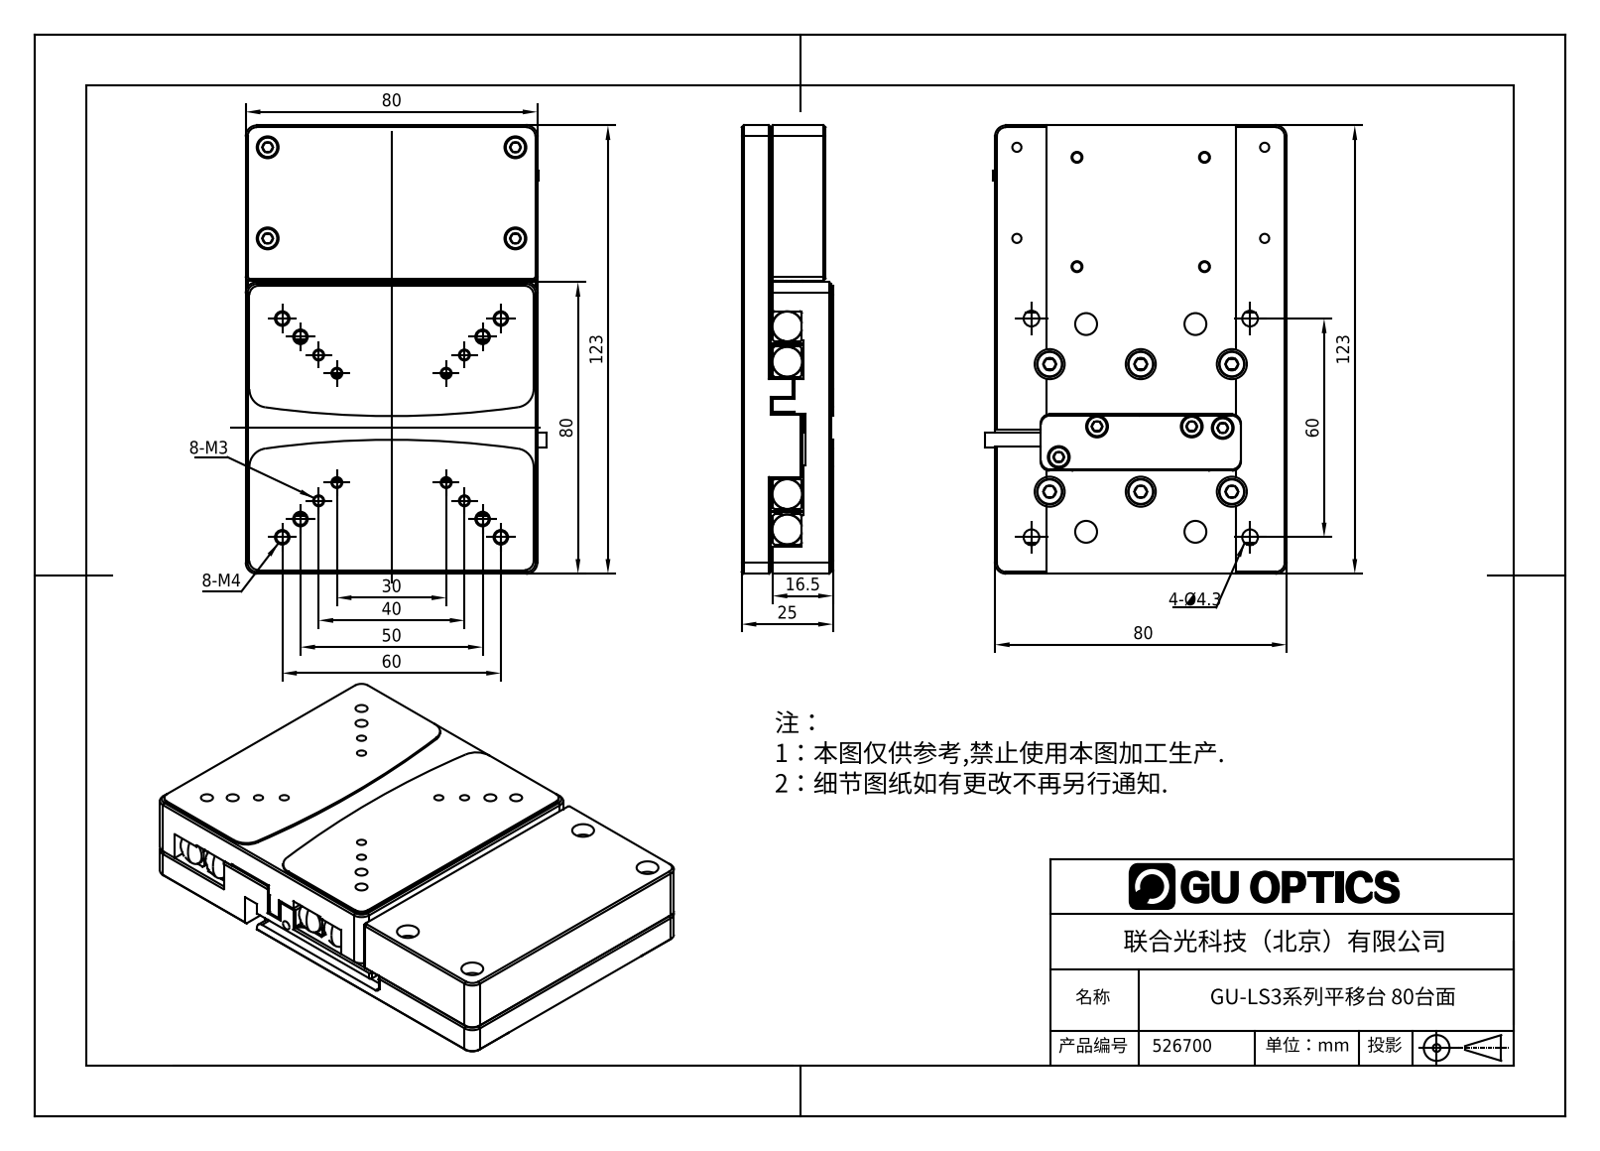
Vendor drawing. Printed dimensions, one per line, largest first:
123
123
80
80
80
60
60
50
40
30
25
16.5
